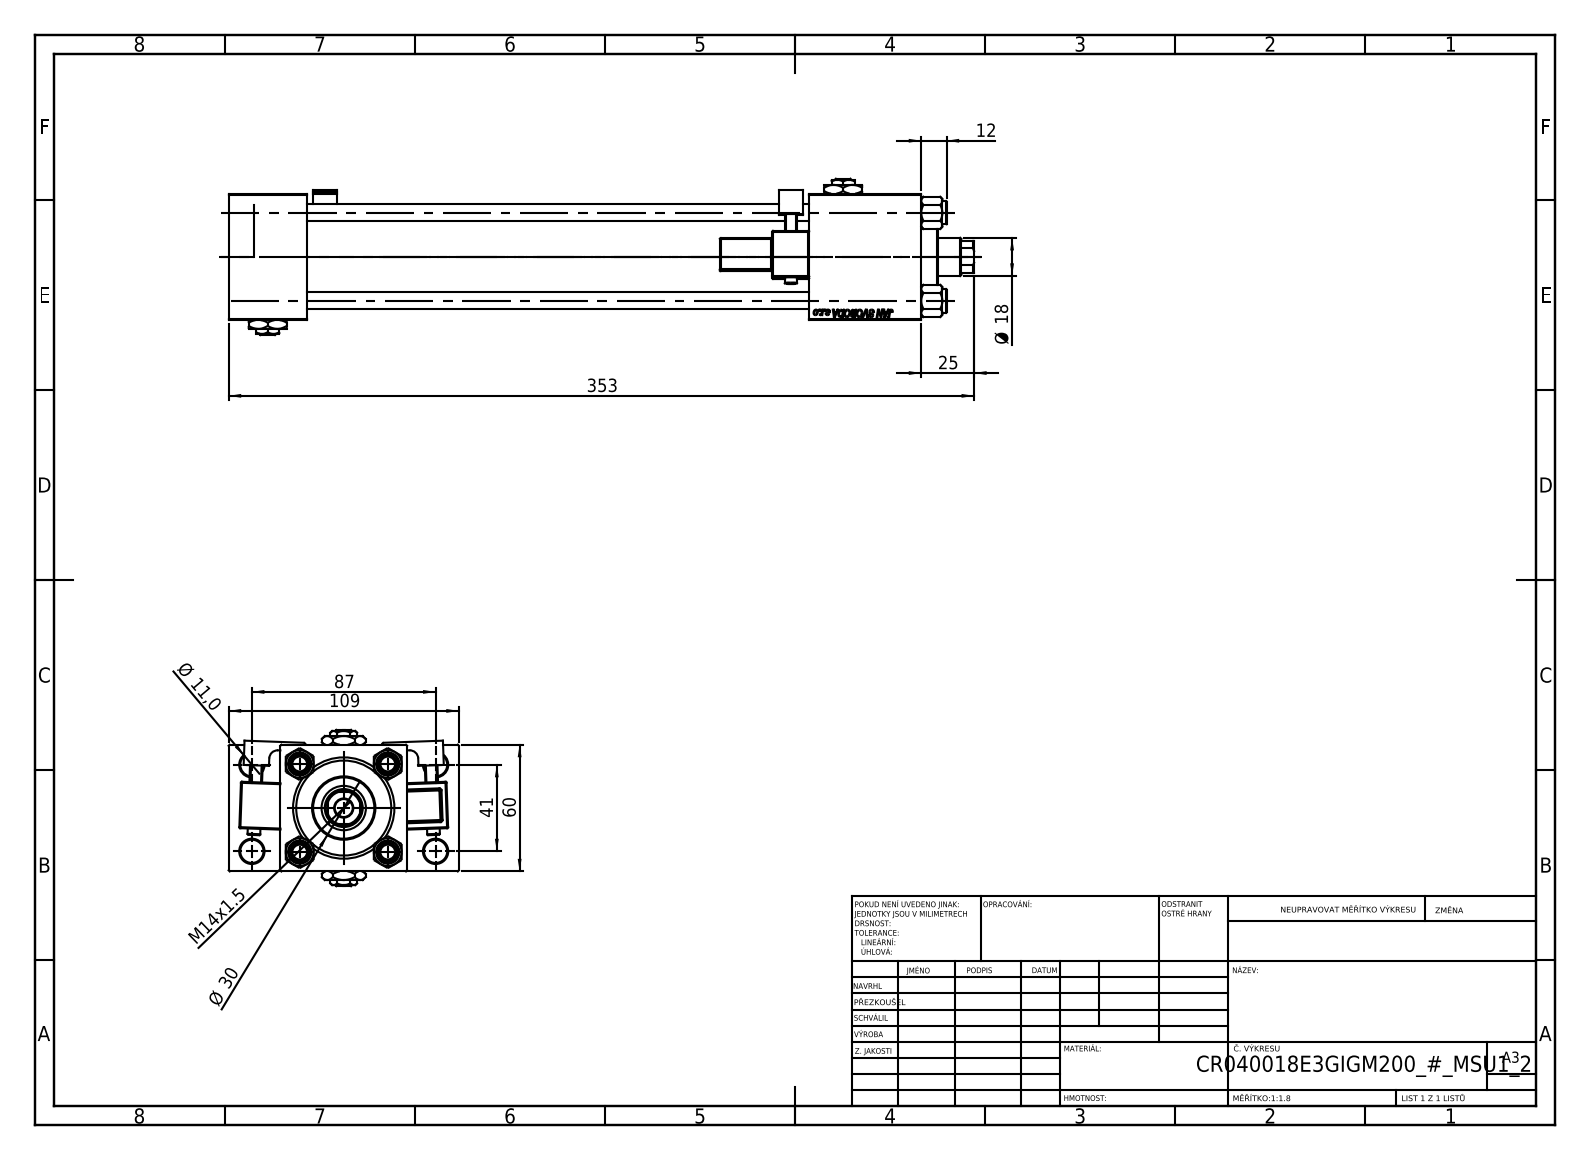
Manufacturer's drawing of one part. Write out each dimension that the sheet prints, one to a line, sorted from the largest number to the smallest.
353
109
87
60
41
Ø 30
25
Ø 18
M14x1.5
12
Ø 11,0
